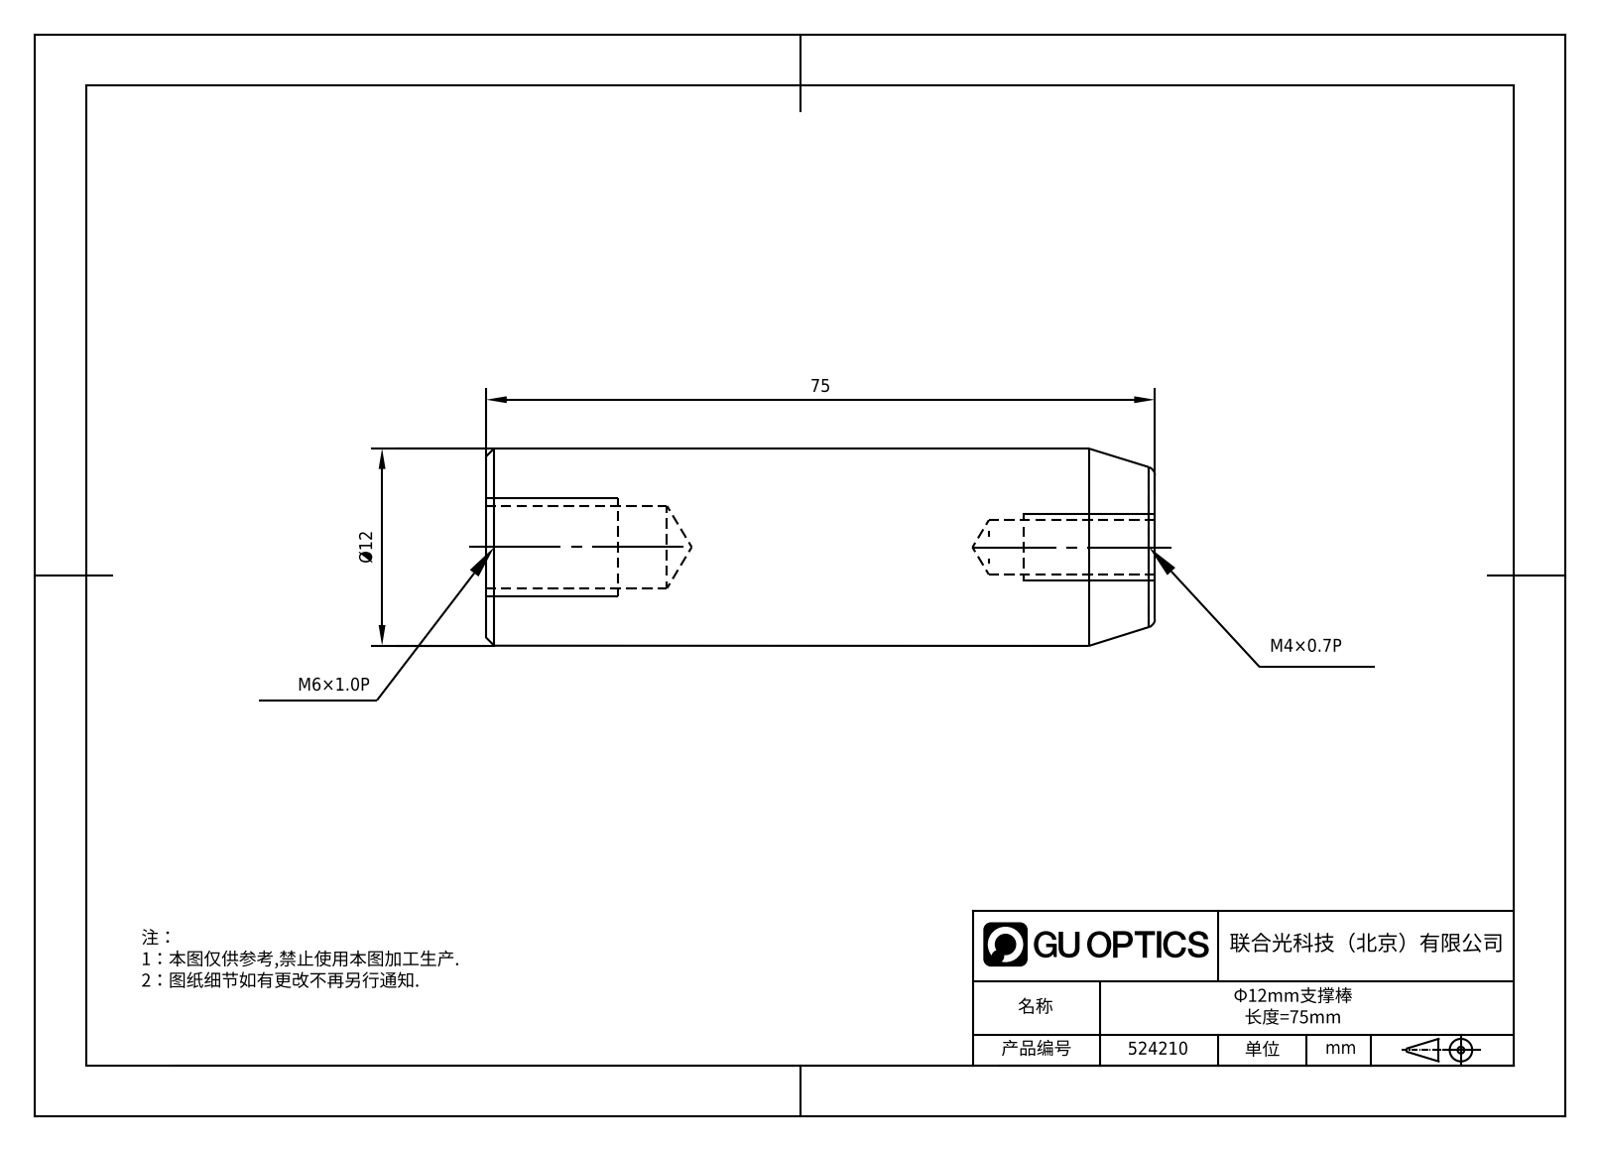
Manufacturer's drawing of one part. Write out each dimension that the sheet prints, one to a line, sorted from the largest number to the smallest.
75
Ø12
